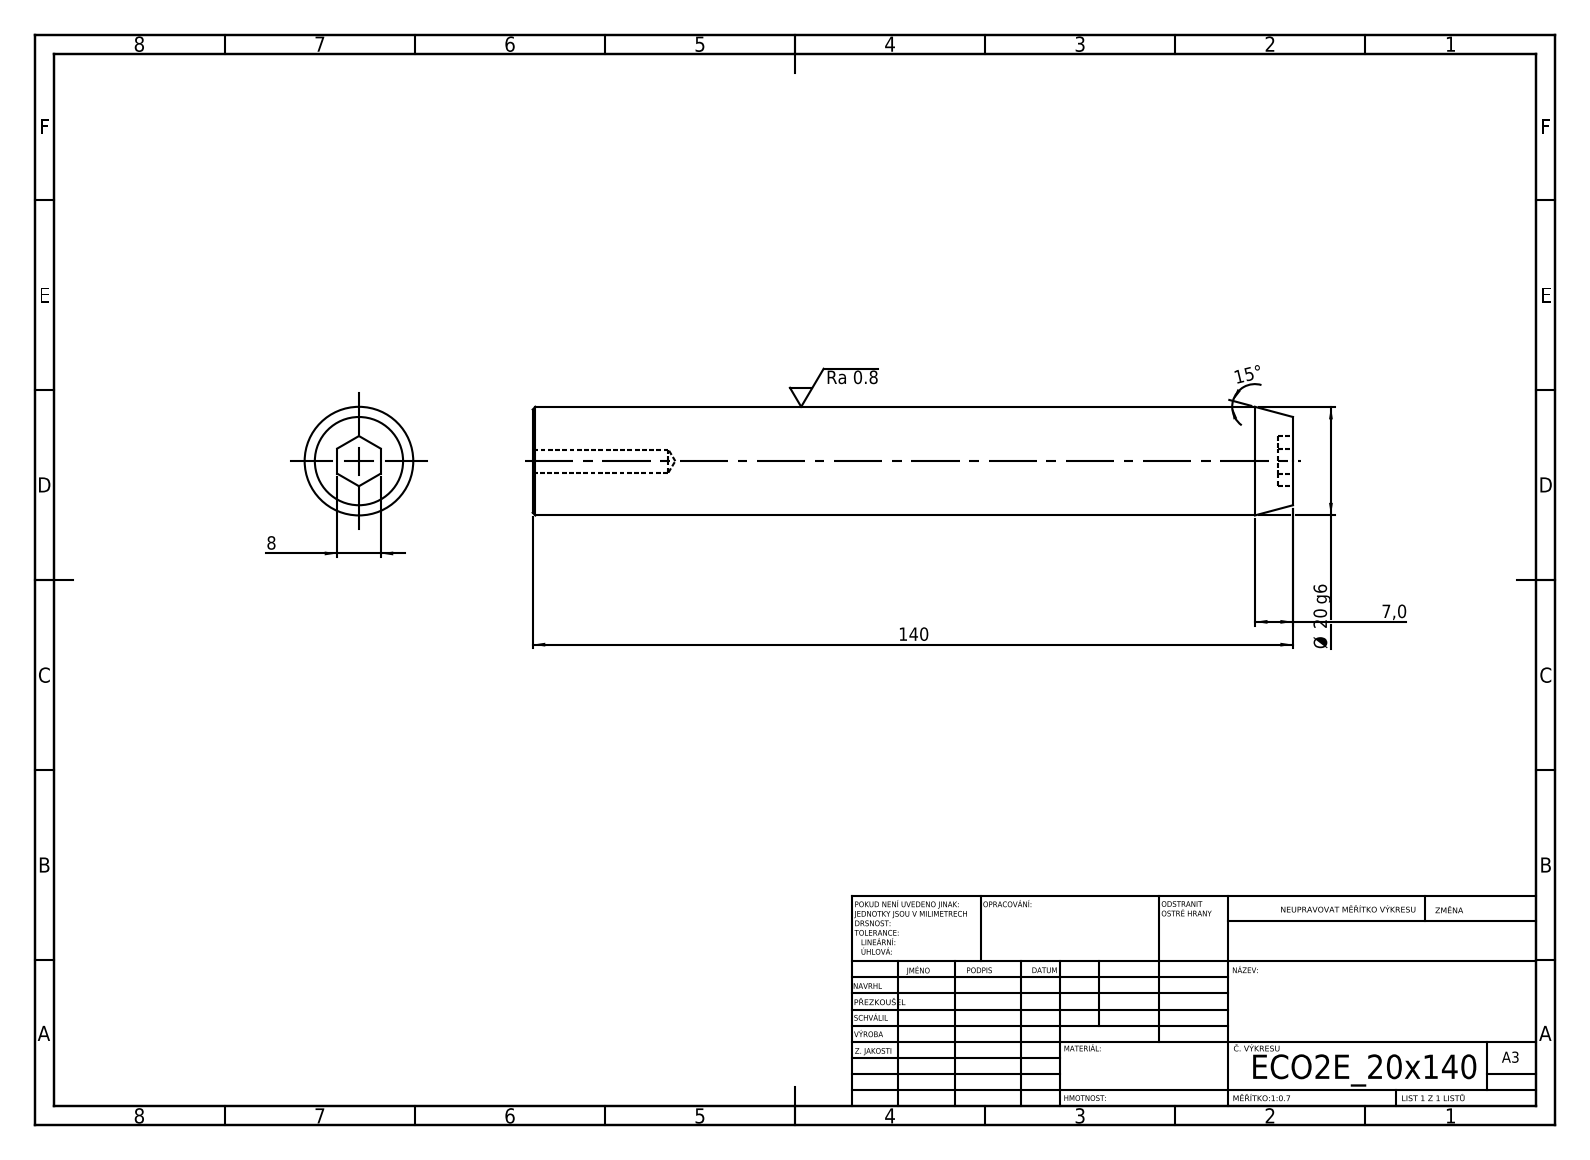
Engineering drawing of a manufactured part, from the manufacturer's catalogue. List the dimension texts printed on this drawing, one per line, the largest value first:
140
Ø 20 g6
15°
8
7,0
